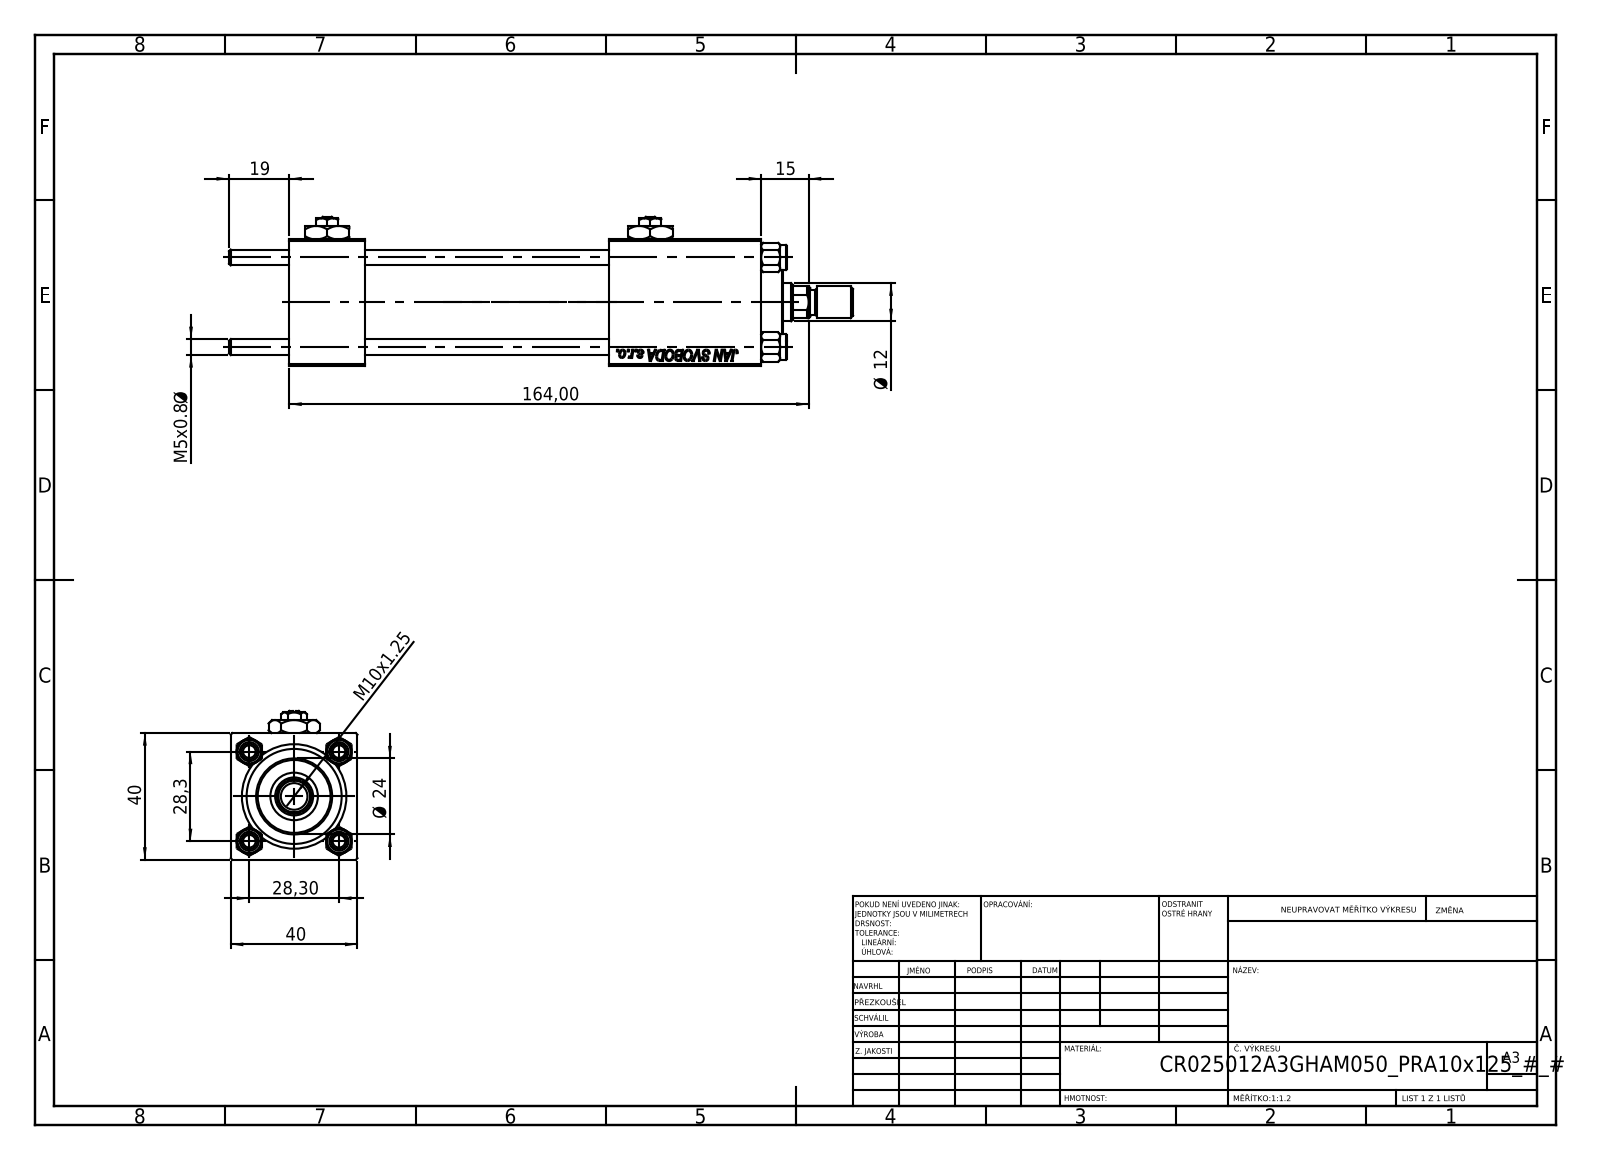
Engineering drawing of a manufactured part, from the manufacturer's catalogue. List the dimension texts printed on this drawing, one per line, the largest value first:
164,00
40
40
28,3
28,30
Ø 24
19
15
Ø 12
M10x1.25
M5x0.8 Ø
